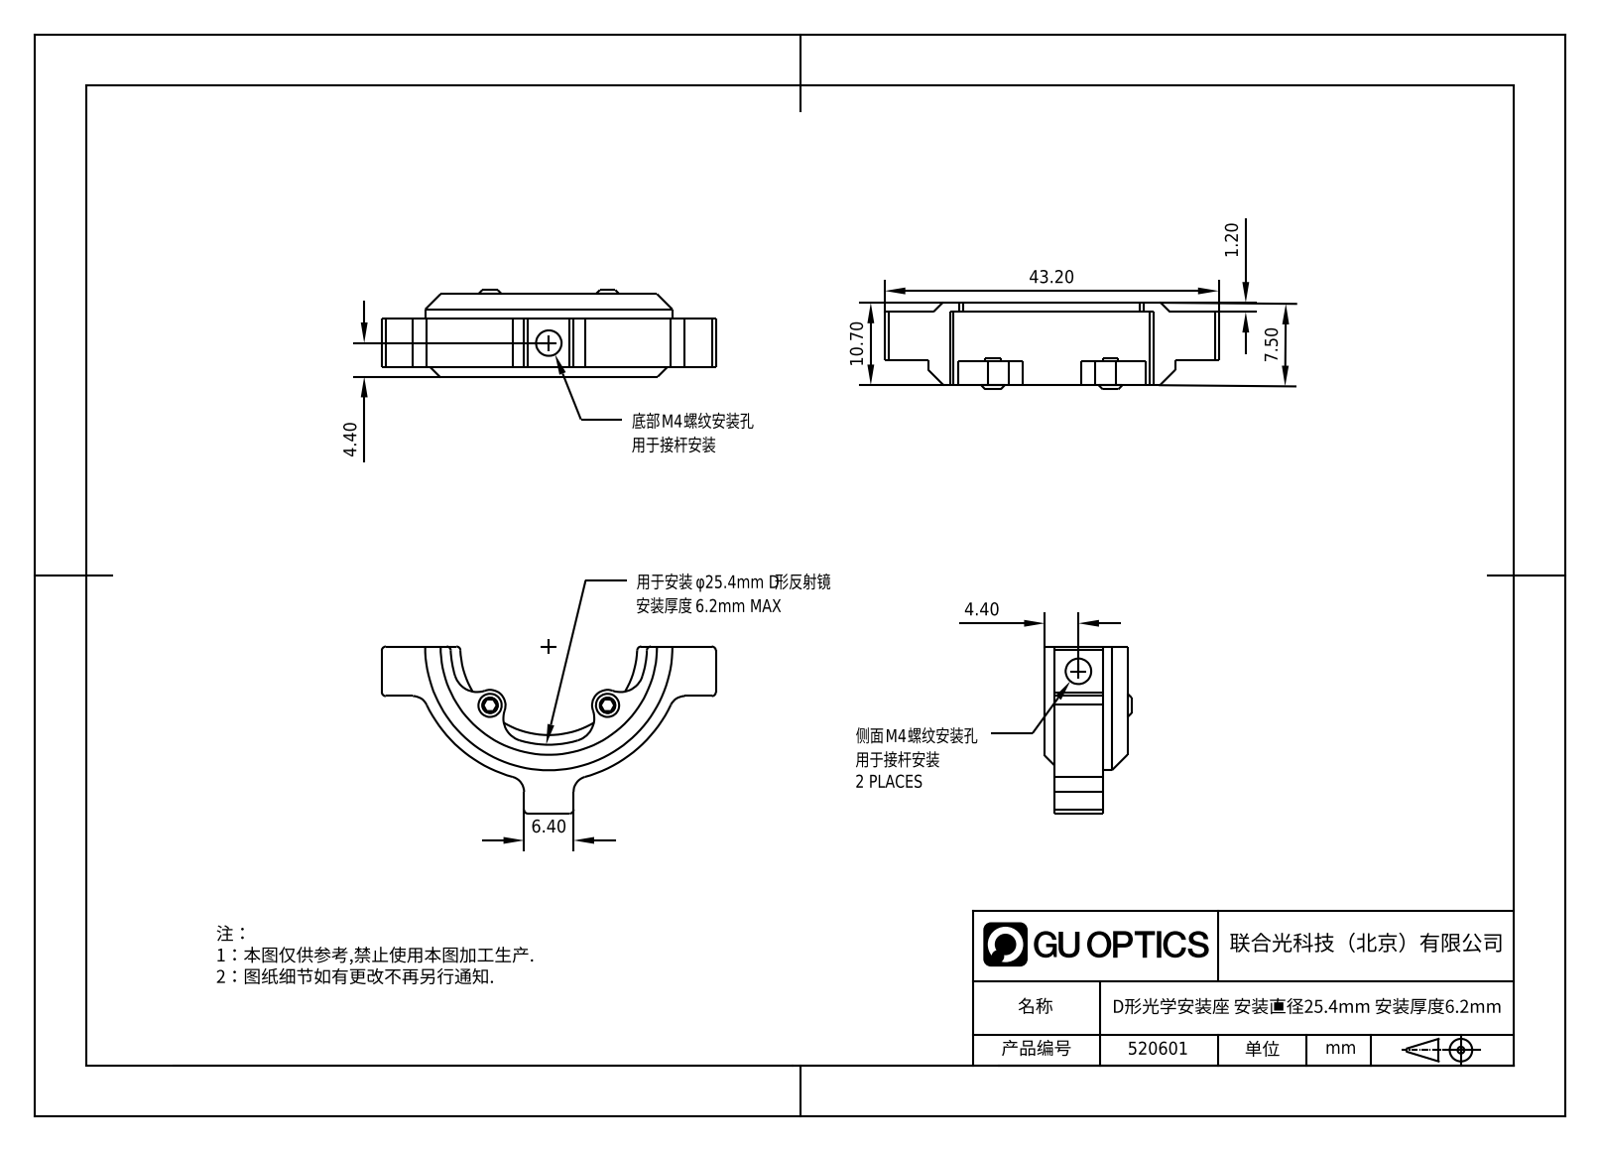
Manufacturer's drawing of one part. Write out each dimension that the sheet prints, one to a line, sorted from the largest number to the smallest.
43.20
10.70
7.50
6.40
4.40
4.40
1.20
